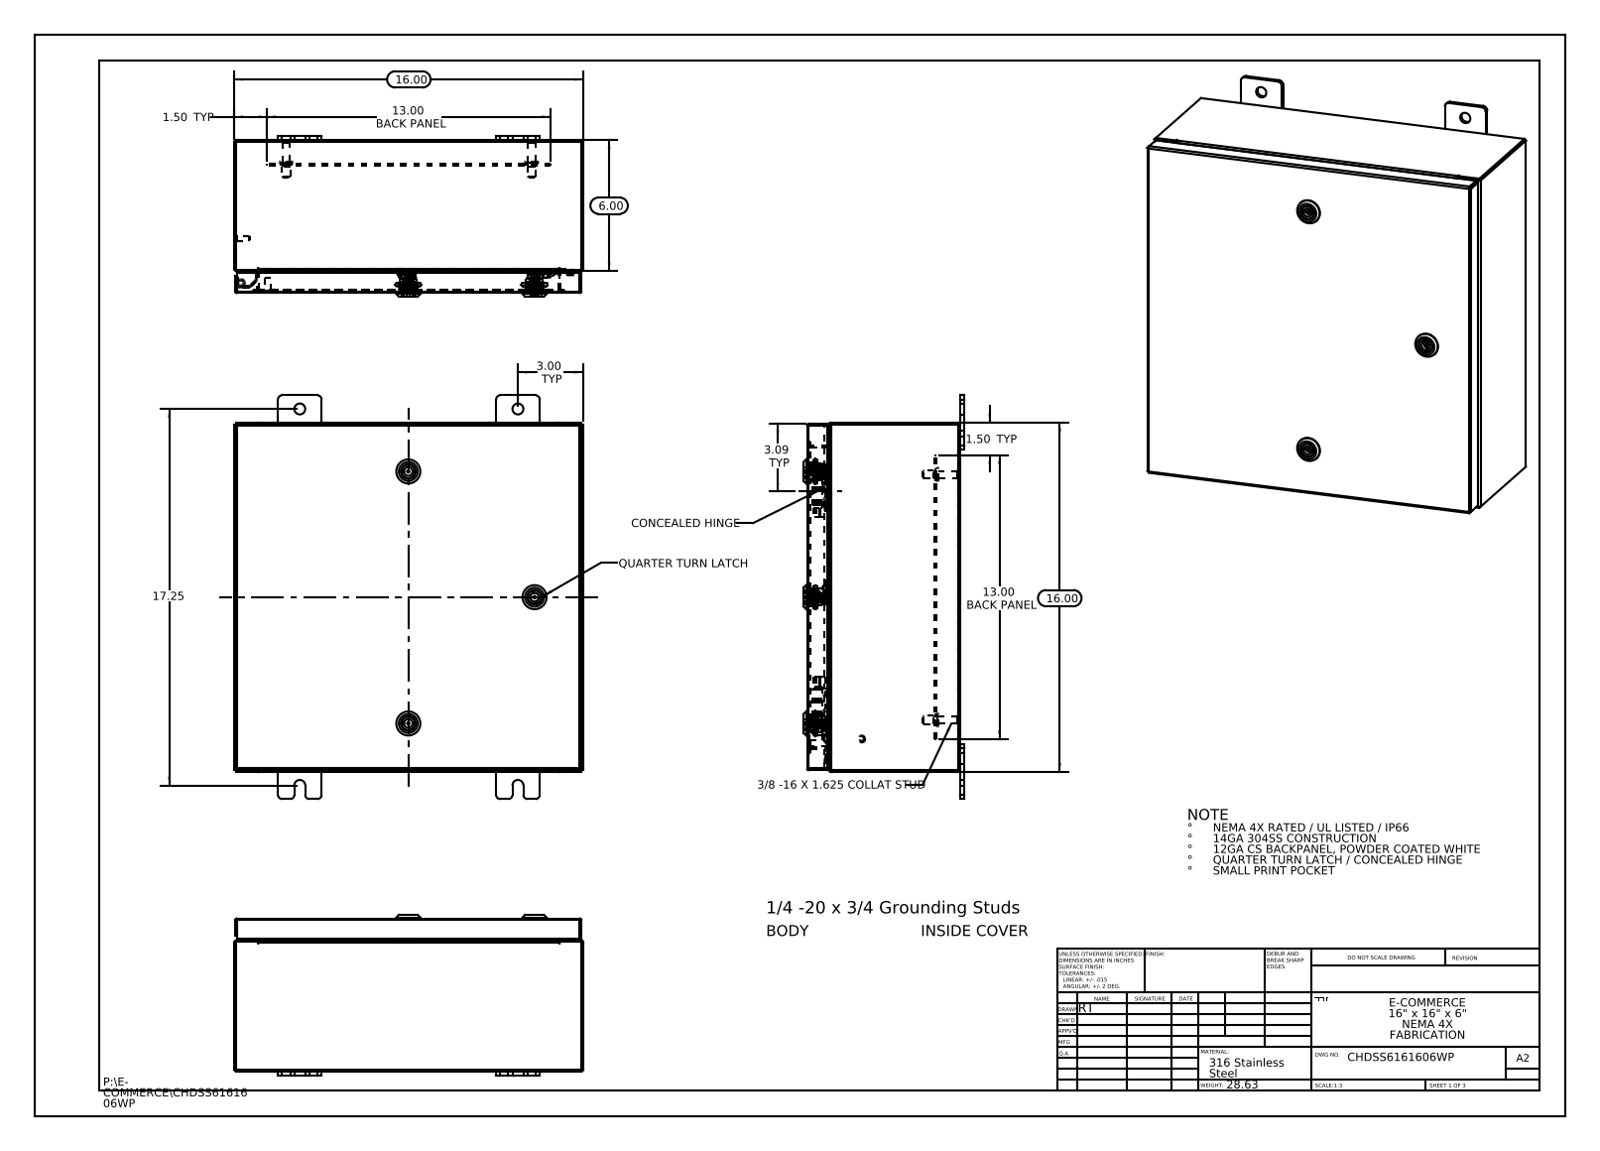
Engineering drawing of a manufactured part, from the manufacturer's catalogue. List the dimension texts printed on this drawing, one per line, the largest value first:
17.25
16.00
16.00
13.00 BACK PANEL
13.00 BACK PANEL
6.00
3.09 TYP
3.00 TYP
1.50 TYP
1.50 TYP
